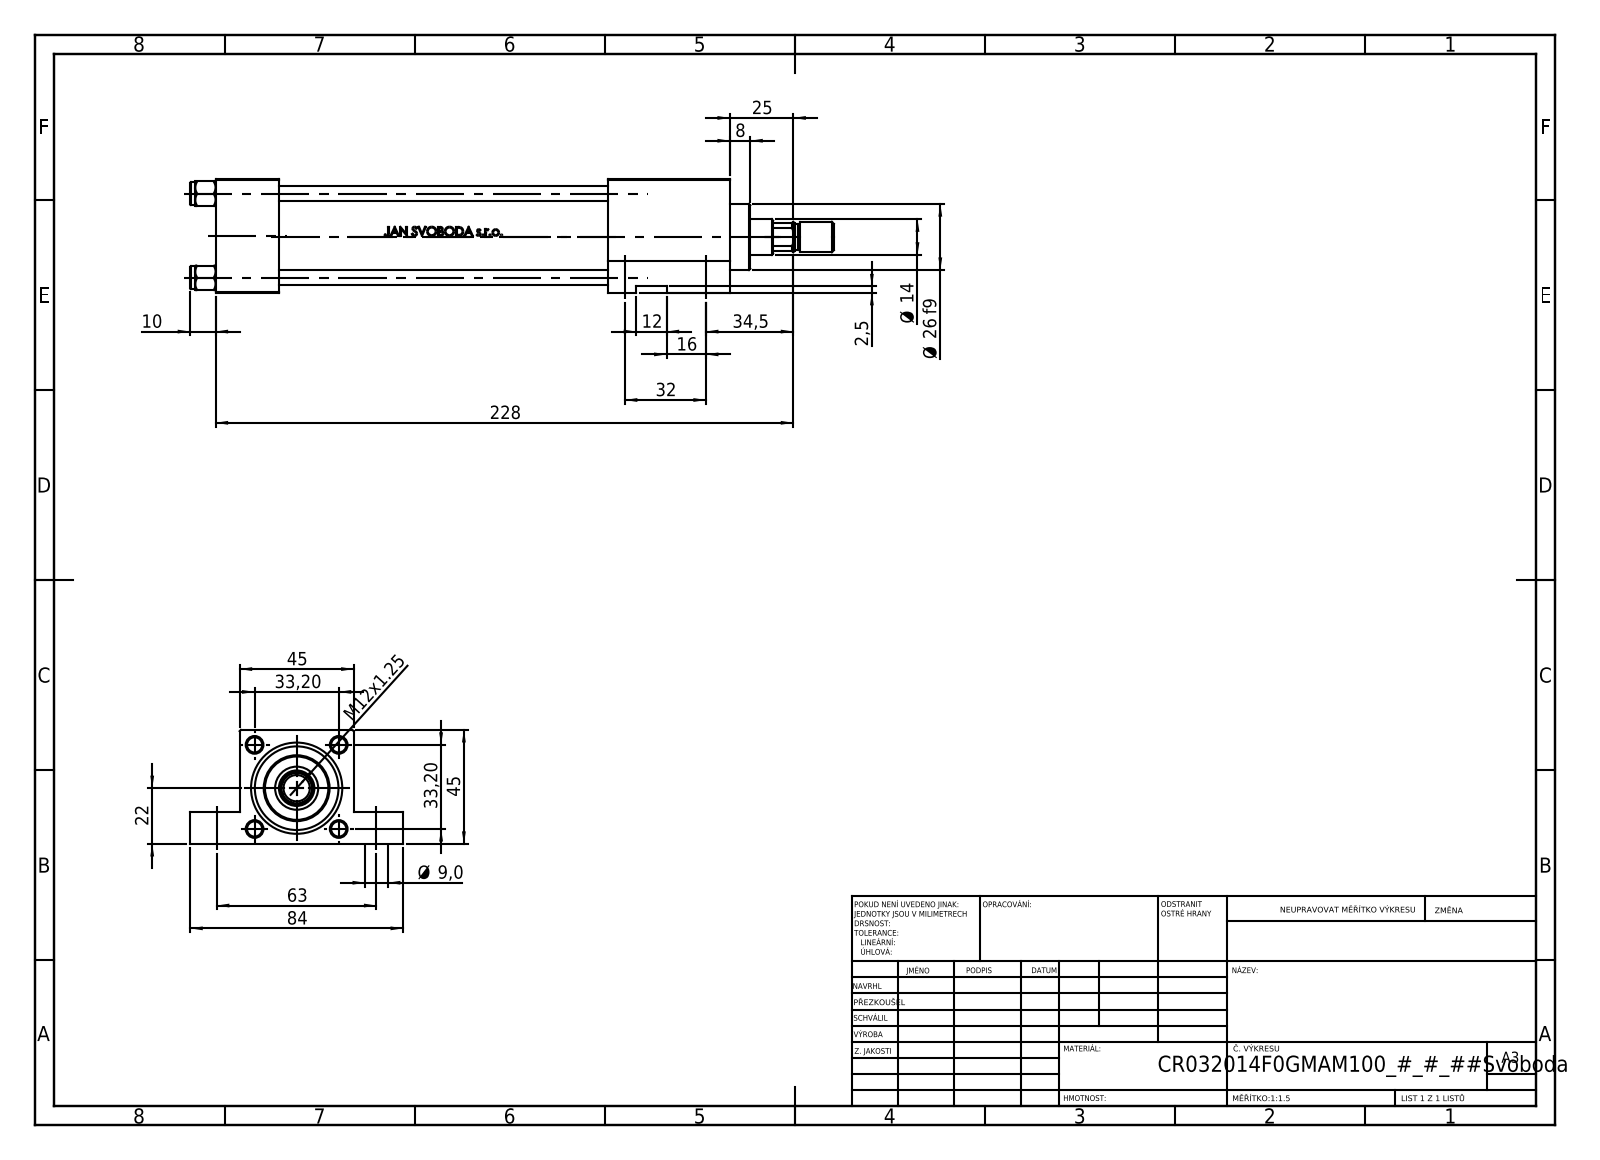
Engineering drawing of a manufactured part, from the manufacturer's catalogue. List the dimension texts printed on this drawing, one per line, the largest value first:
228
84
63
45
45
34,5
33,20
33,20
32
Ø 26 f9
25
22
16
Ø 14
12
M12x1.25
10
Ø 9,0
8
2,5
